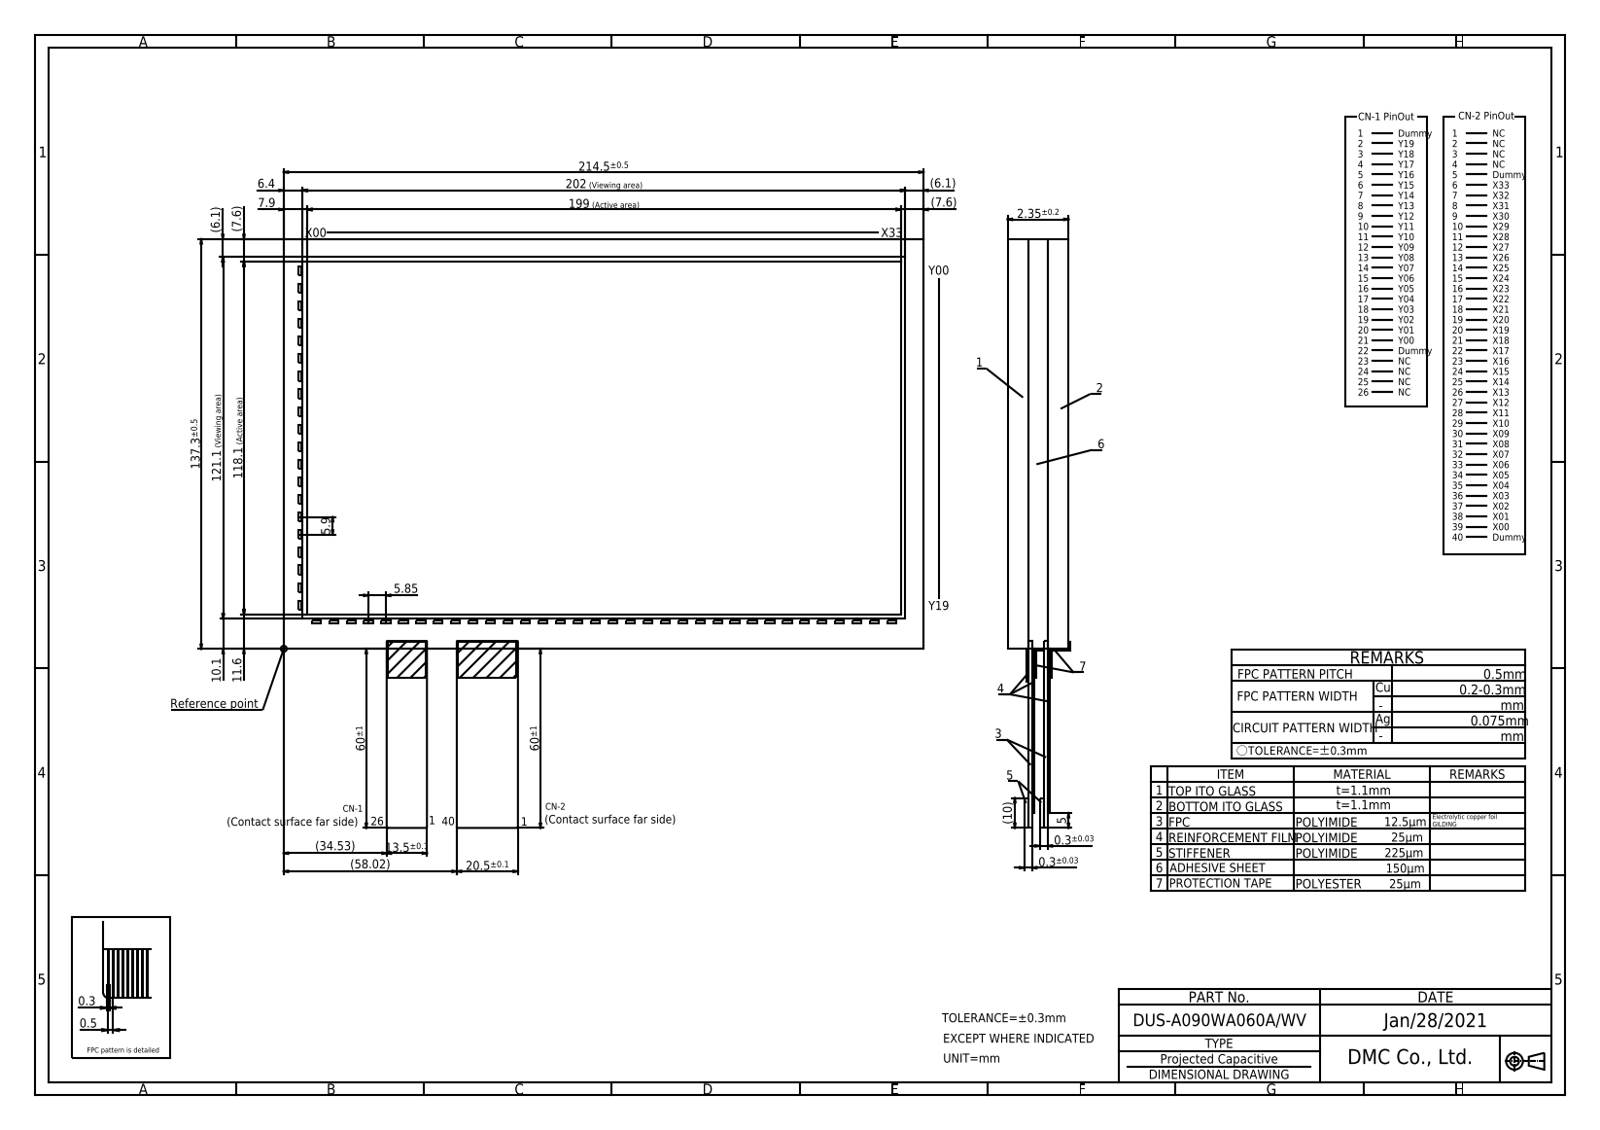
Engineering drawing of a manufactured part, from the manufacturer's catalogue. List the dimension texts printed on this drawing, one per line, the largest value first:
214.5±0.5
202 (Viewing area)
199 (Active area)
137.3±0.5
121.1 (Viewing area)
118.1 (Active area)
60±1
60±1
(58.02)
(34.53)
20.5±0.1
13.5±0.1
11.6
10.1
(10)
7.9
(7.6)
(7.6)
6.4
(6.1)
(6.1)
5.9
5.85
5
2.35±0.2
0.5
0.3±0.03
0.3±0.03
0.3
